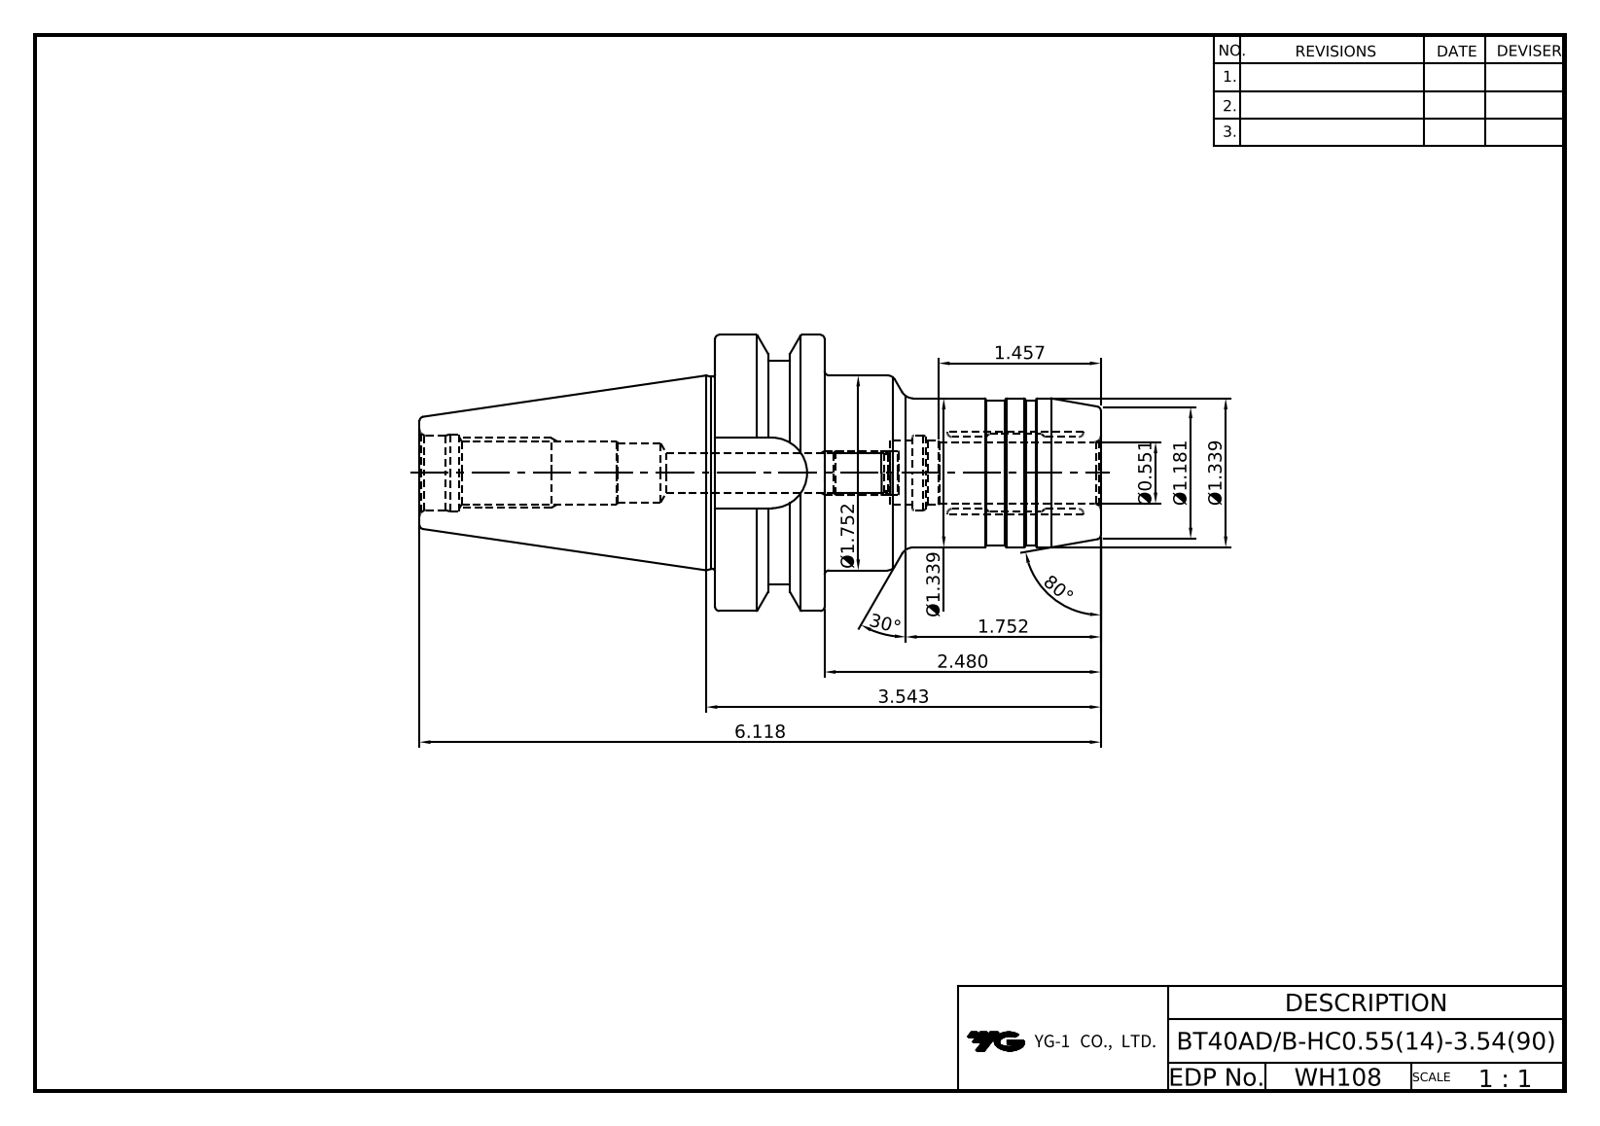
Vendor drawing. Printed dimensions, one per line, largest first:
80°
30°
6.118
3.543
2.480
1.752
Ø1.752
1.457
Ø1.339
Ø1.339
Ø1.181
Ø0.551
